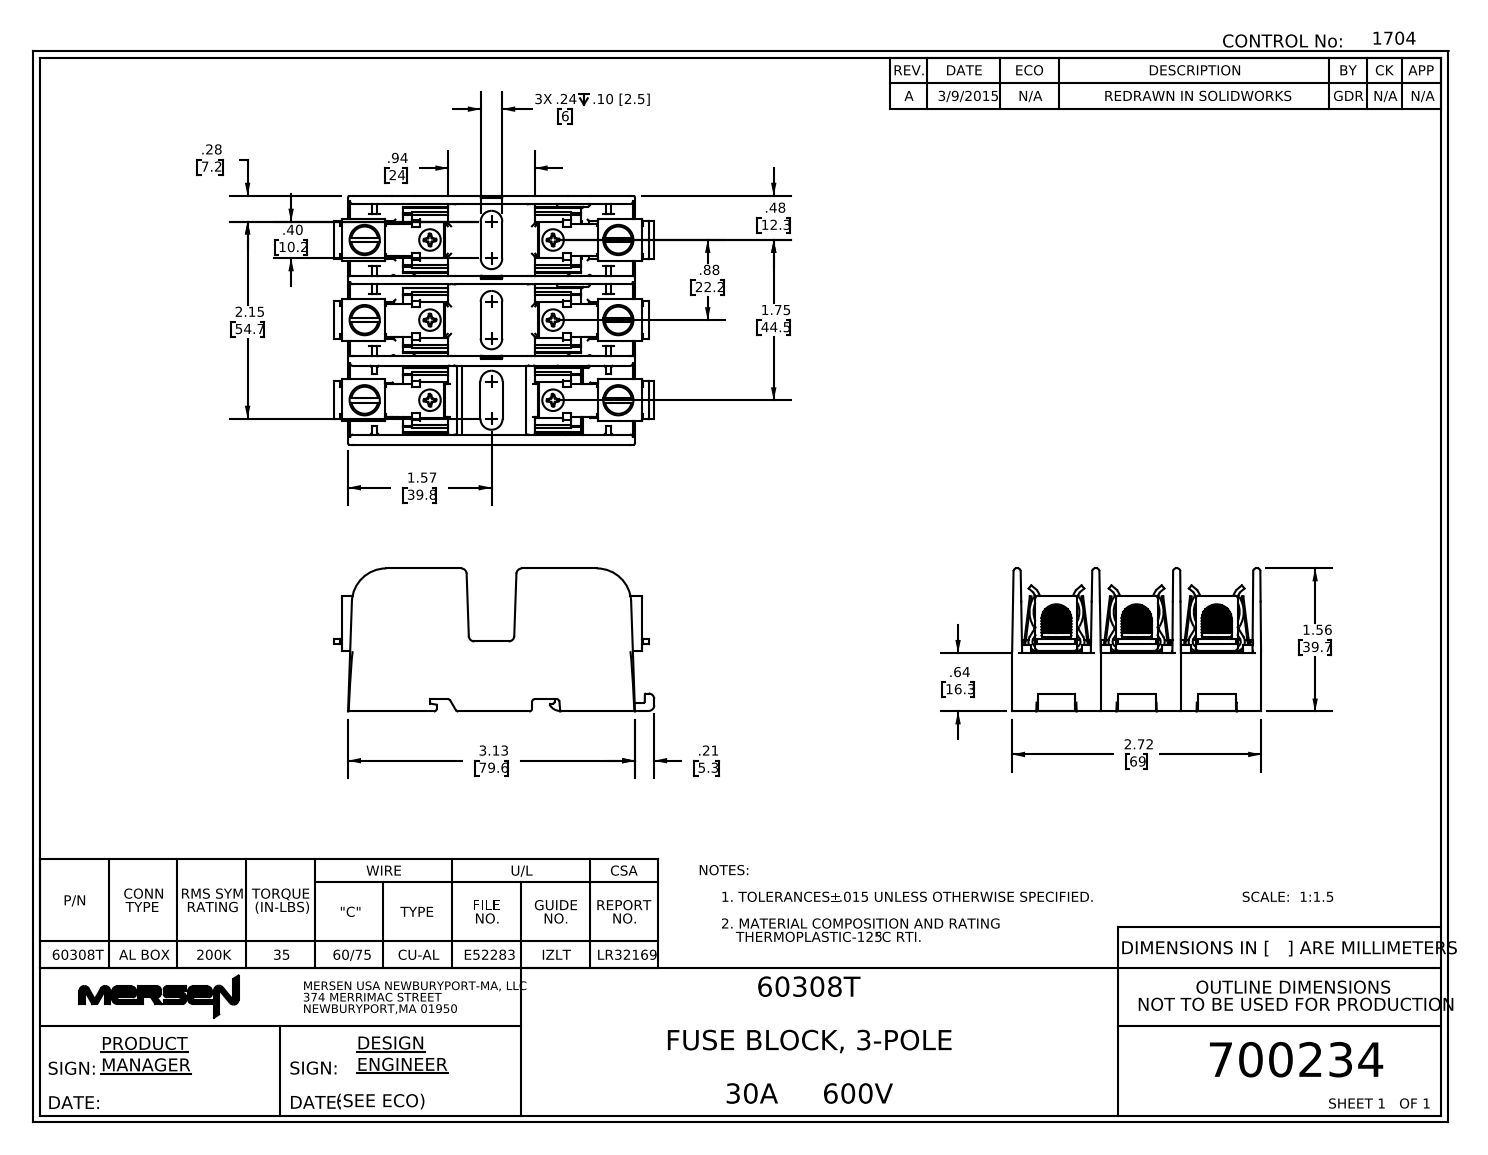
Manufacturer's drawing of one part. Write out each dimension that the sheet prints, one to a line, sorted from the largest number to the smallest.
3.13 79.6
2.72 69
2.15 54.7
1.75 44.5
1.57 39.8
1.56 39.7
.94 24
.88 22.2
.64 16.3
.48 12.3
.40 10.2
.28 7.2
3X .24 6 .10 [2.5]
.21 5.3
